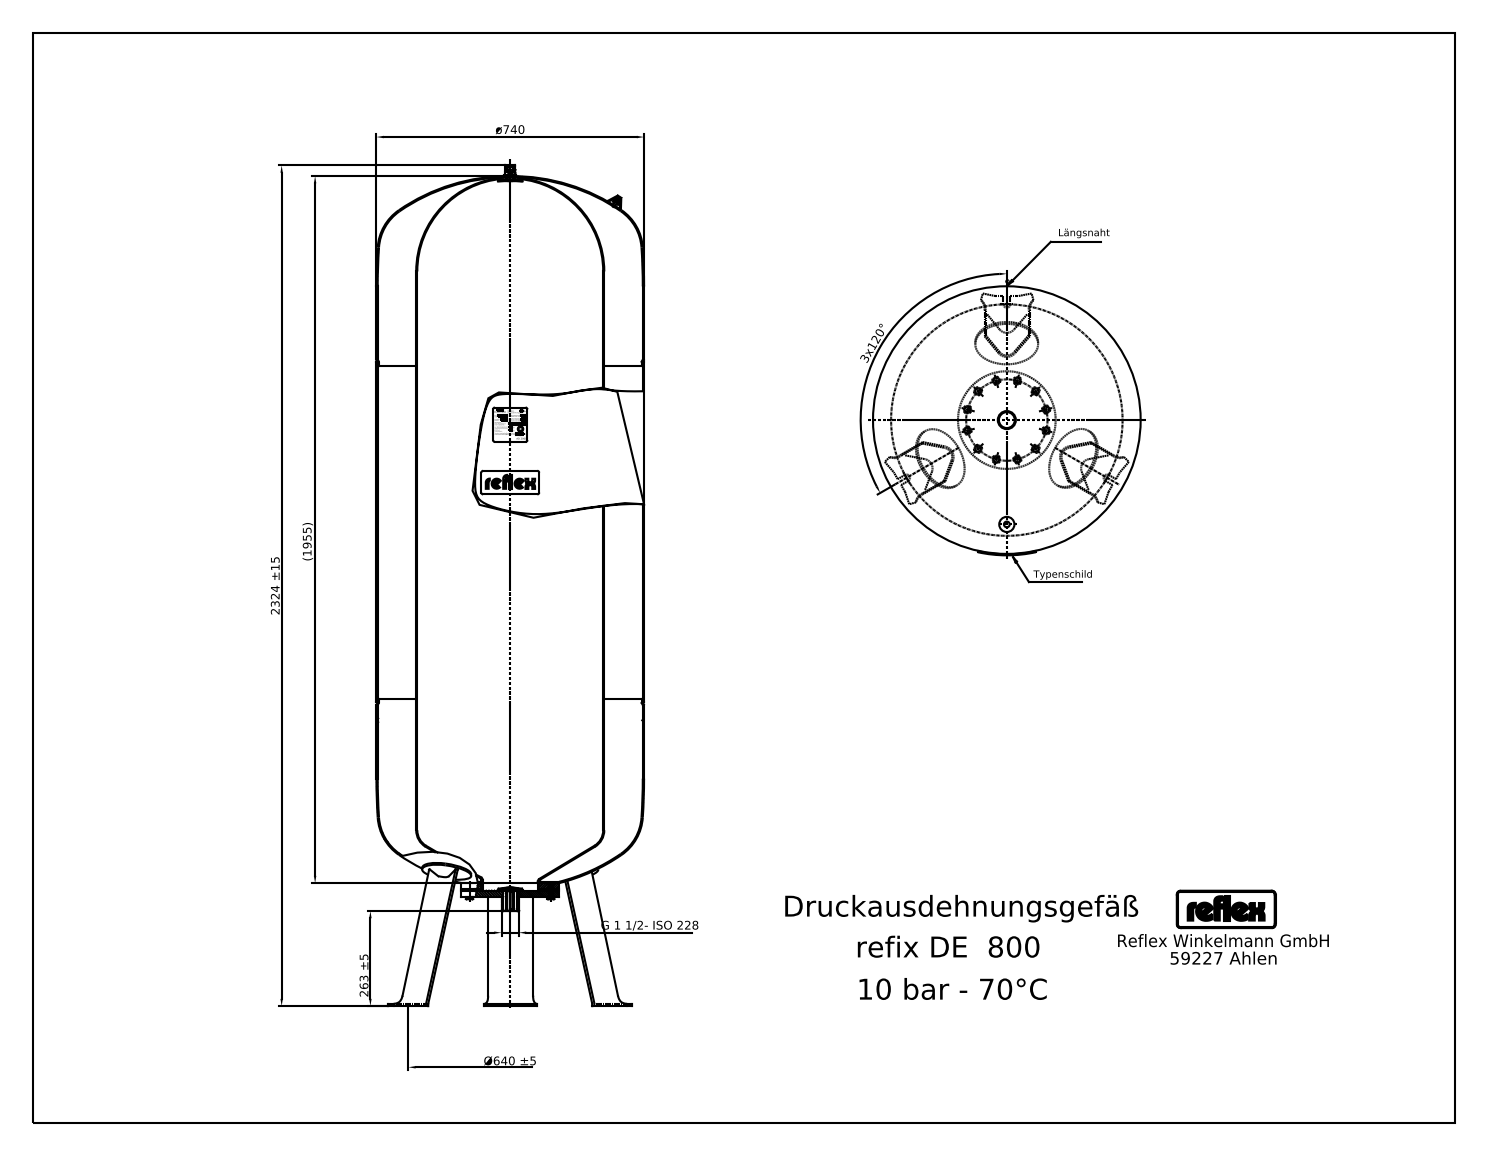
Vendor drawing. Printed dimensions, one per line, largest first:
2324 ±15
(1955)
ø740
Ø640 ±5
263 ±5
3x120°
G 1 1/2- ISO 228
